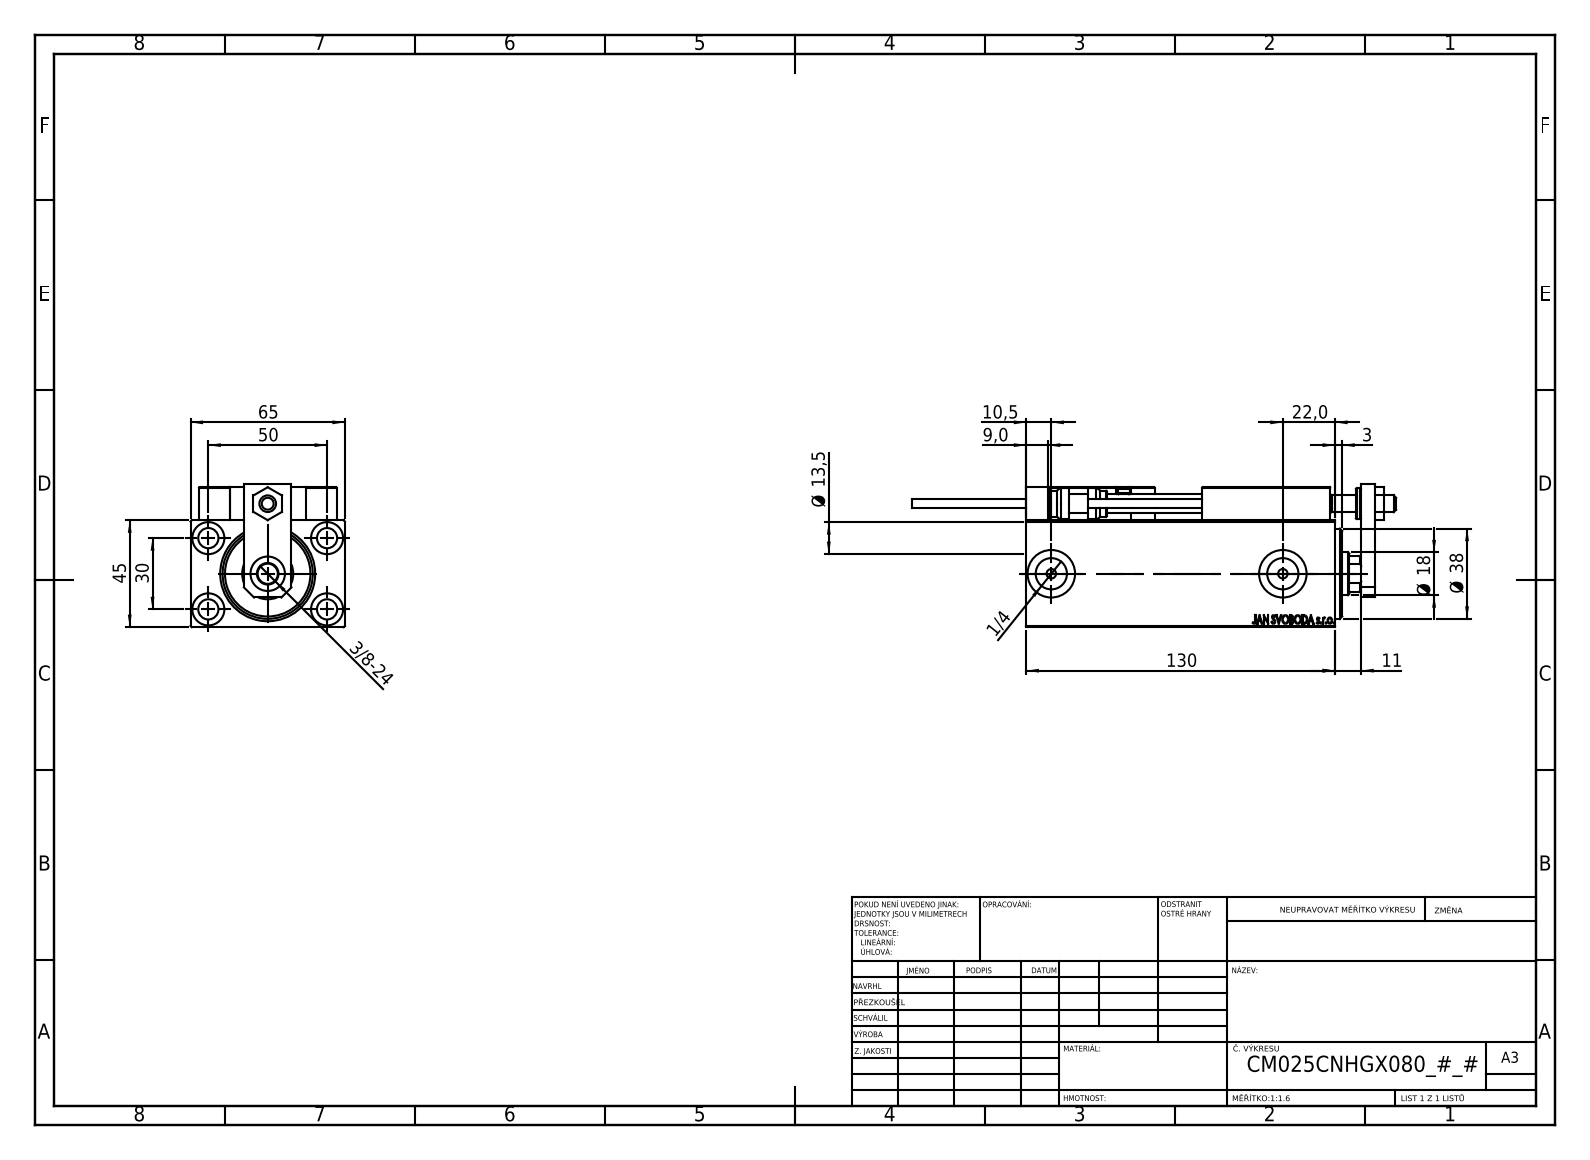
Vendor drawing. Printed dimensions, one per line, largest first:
130
65
50
45
Ø 38
30
22,0
Ø 18
Ø 13,5
11
10,5
9,0
3
3/8-24
1/4
